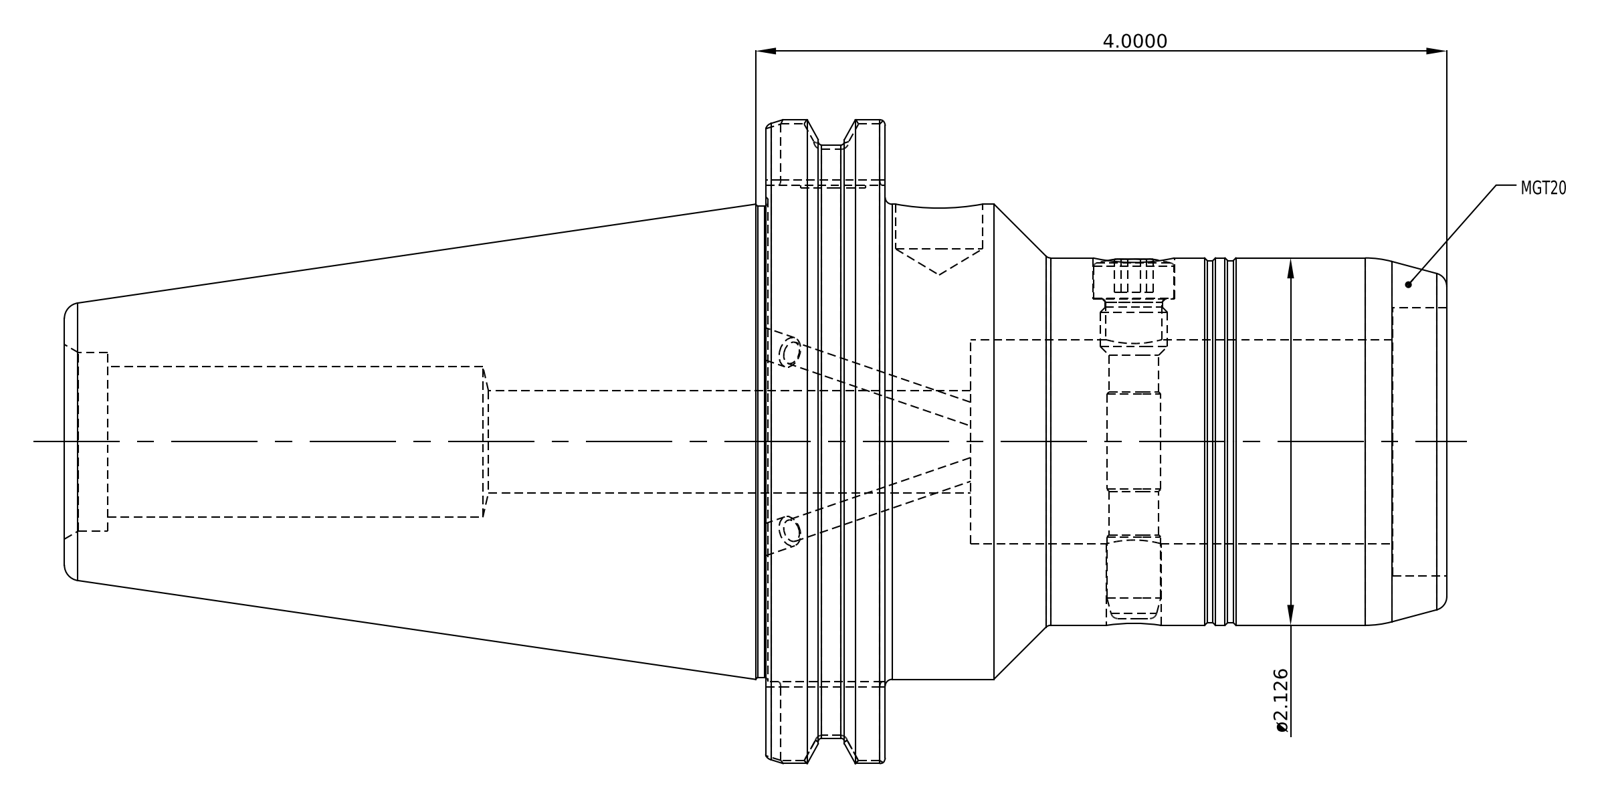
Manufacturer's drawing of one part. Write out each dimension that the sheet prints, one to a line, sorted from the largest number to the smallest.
4.0000
ø2.126
